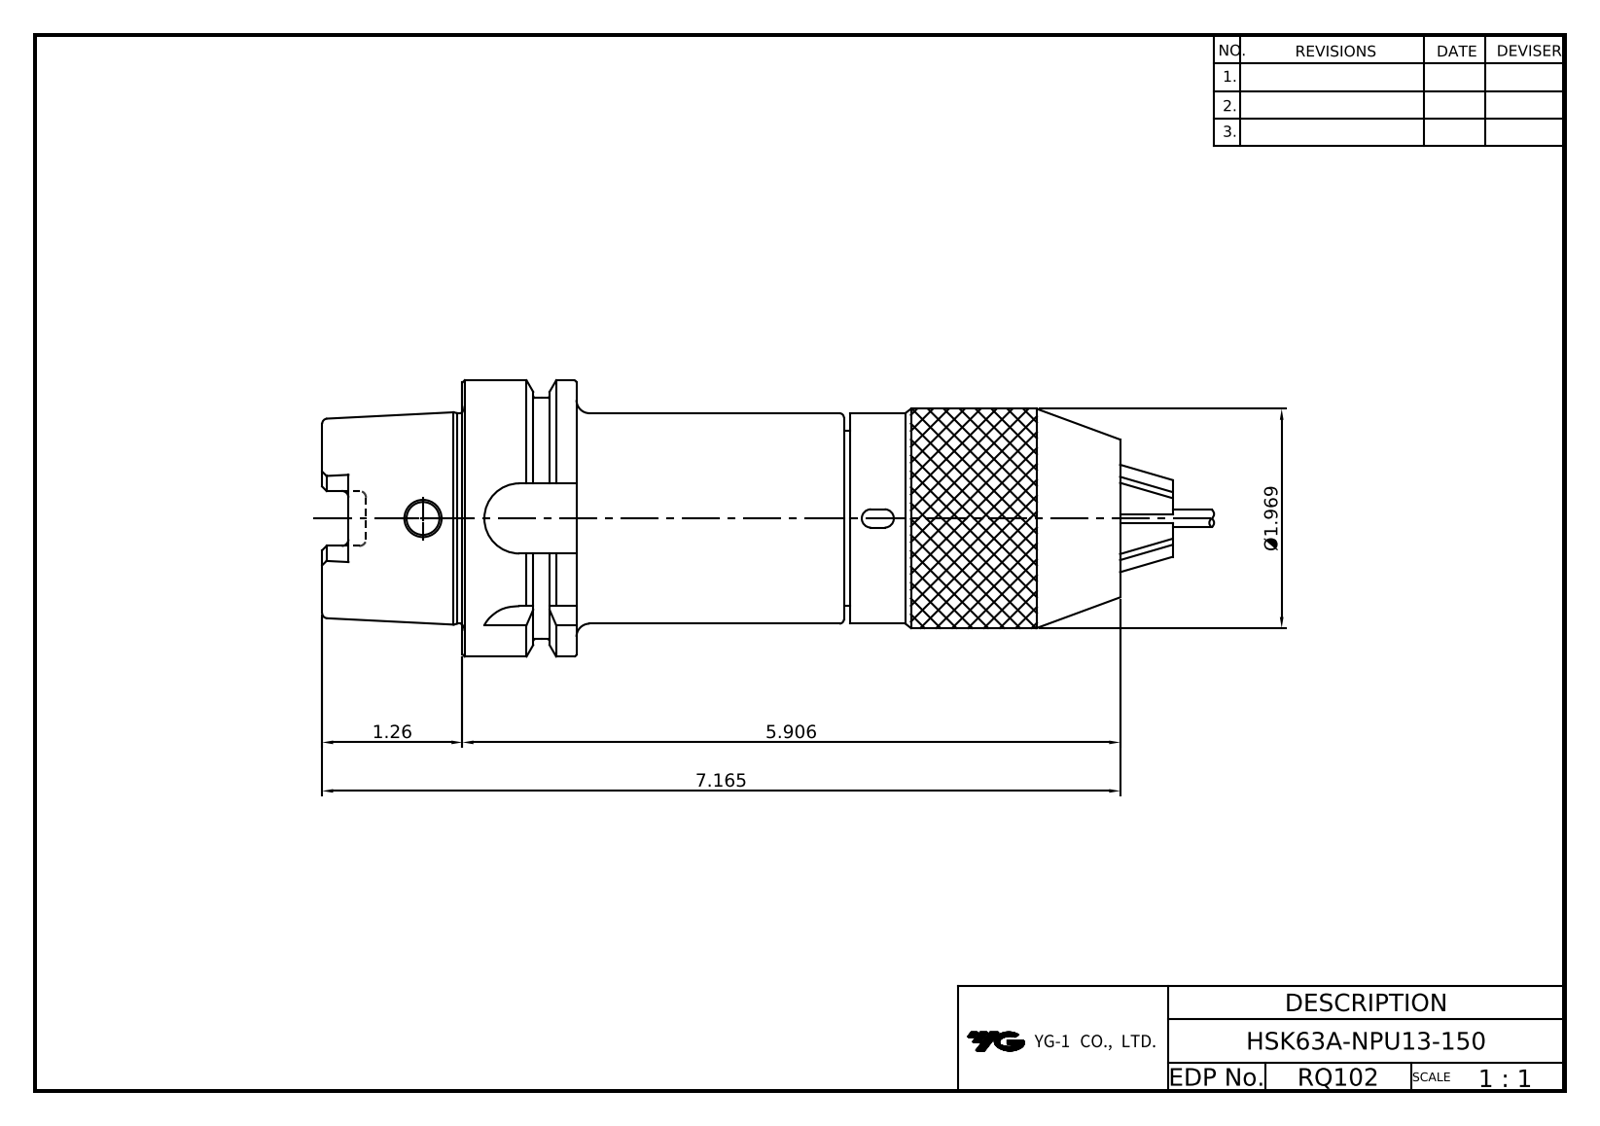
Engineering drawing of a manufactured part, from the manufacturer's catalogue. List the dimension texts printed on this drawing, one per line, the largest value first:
7.165
5.906
Ø1.969
1.26
